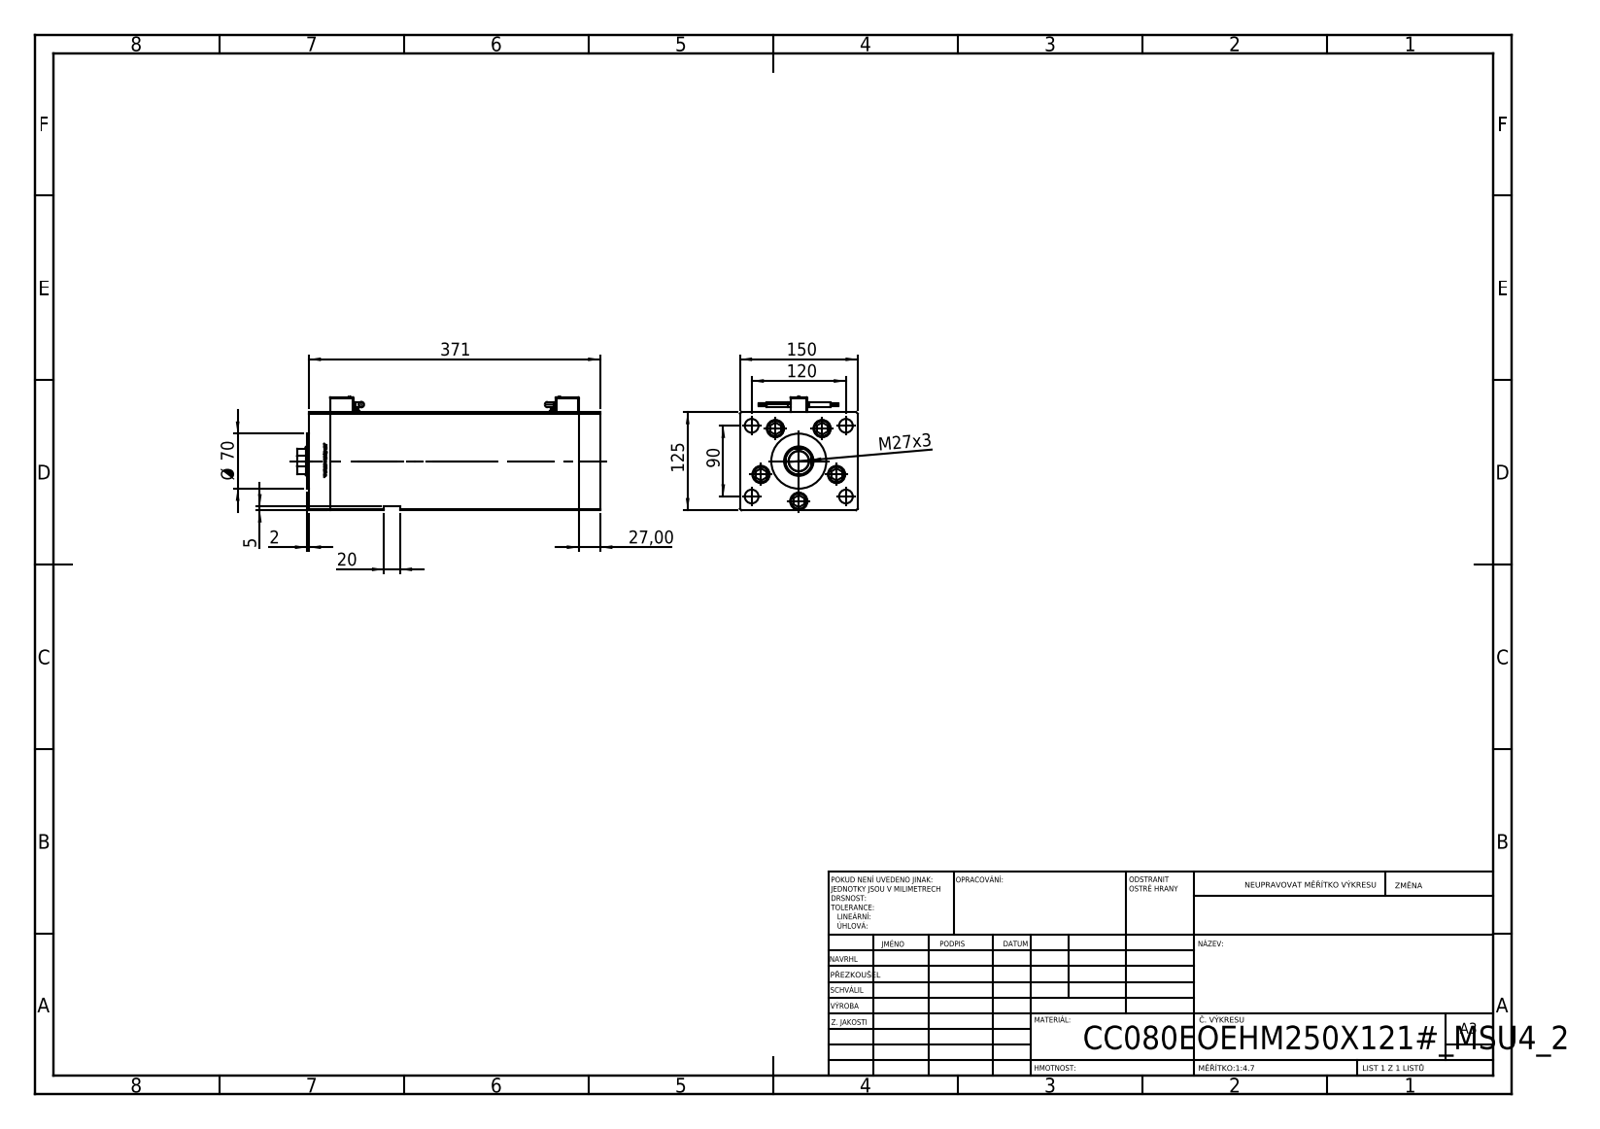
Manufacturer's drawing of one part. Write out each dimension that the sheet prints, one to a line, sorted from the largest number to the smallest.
371
150
125
120
90
Ø 70
27,00
M27x3
20
5
2
